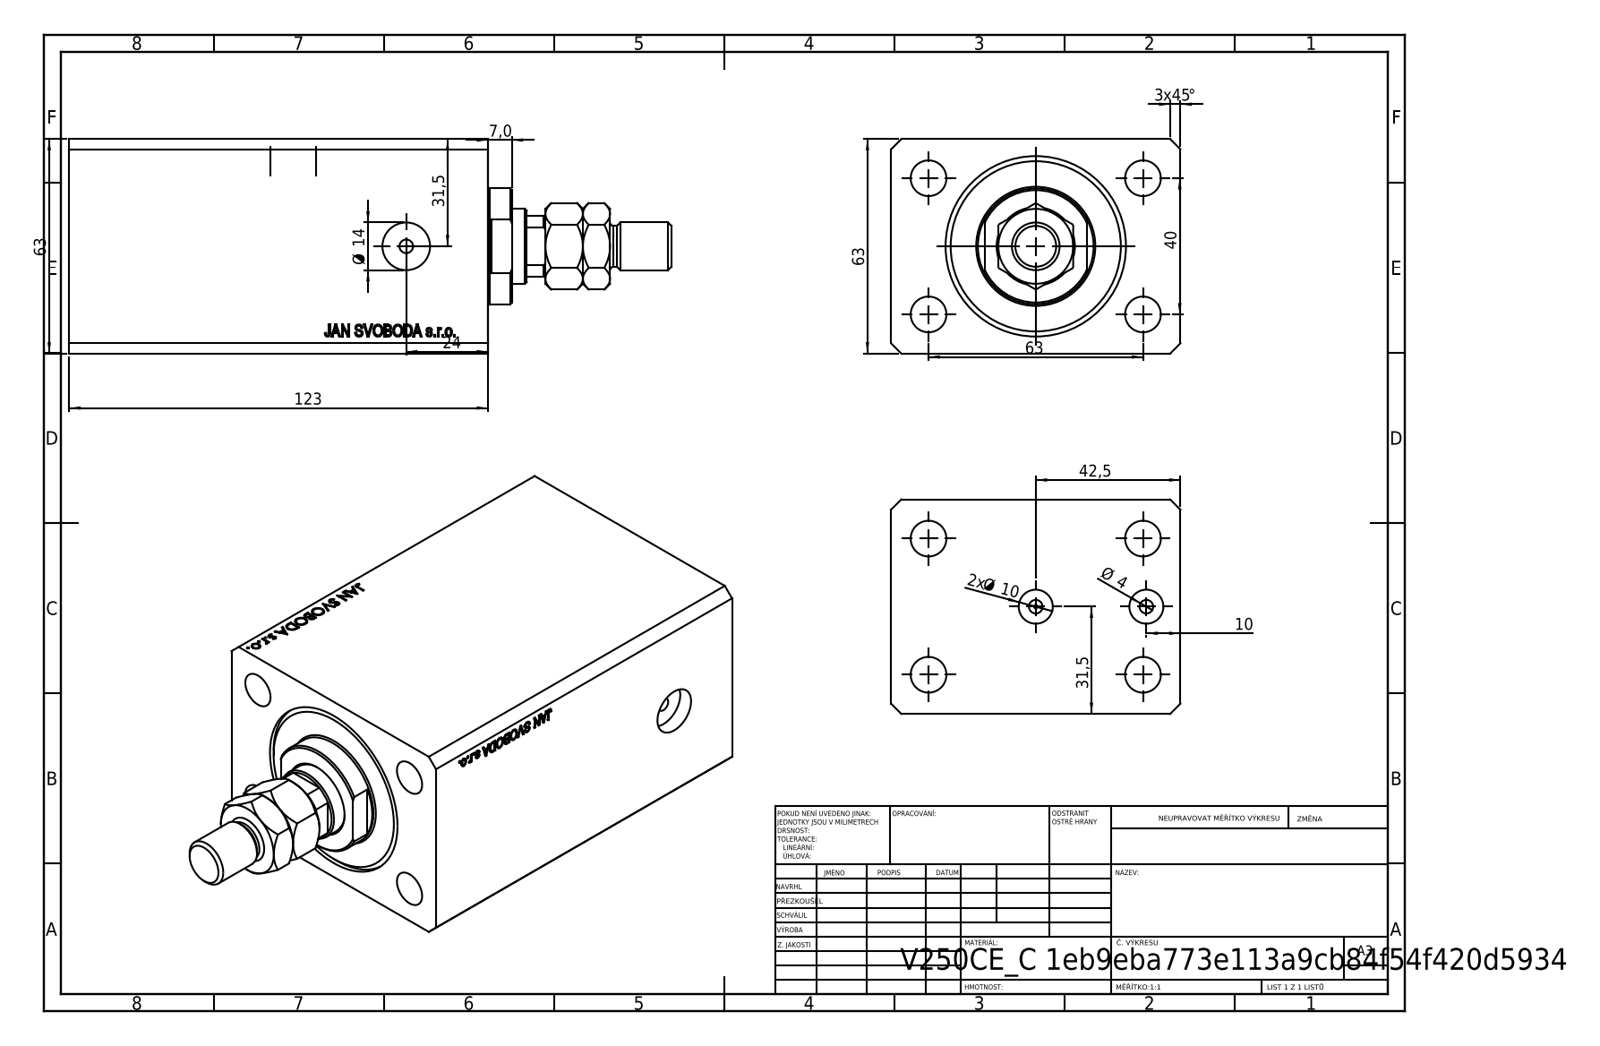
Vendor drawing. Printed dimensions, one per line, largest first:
123
63
63
63
3 x45 °
42,5
40
31,5
31,5
24
Ø 14
2x Ø 10
10
7,0
Ø 4
